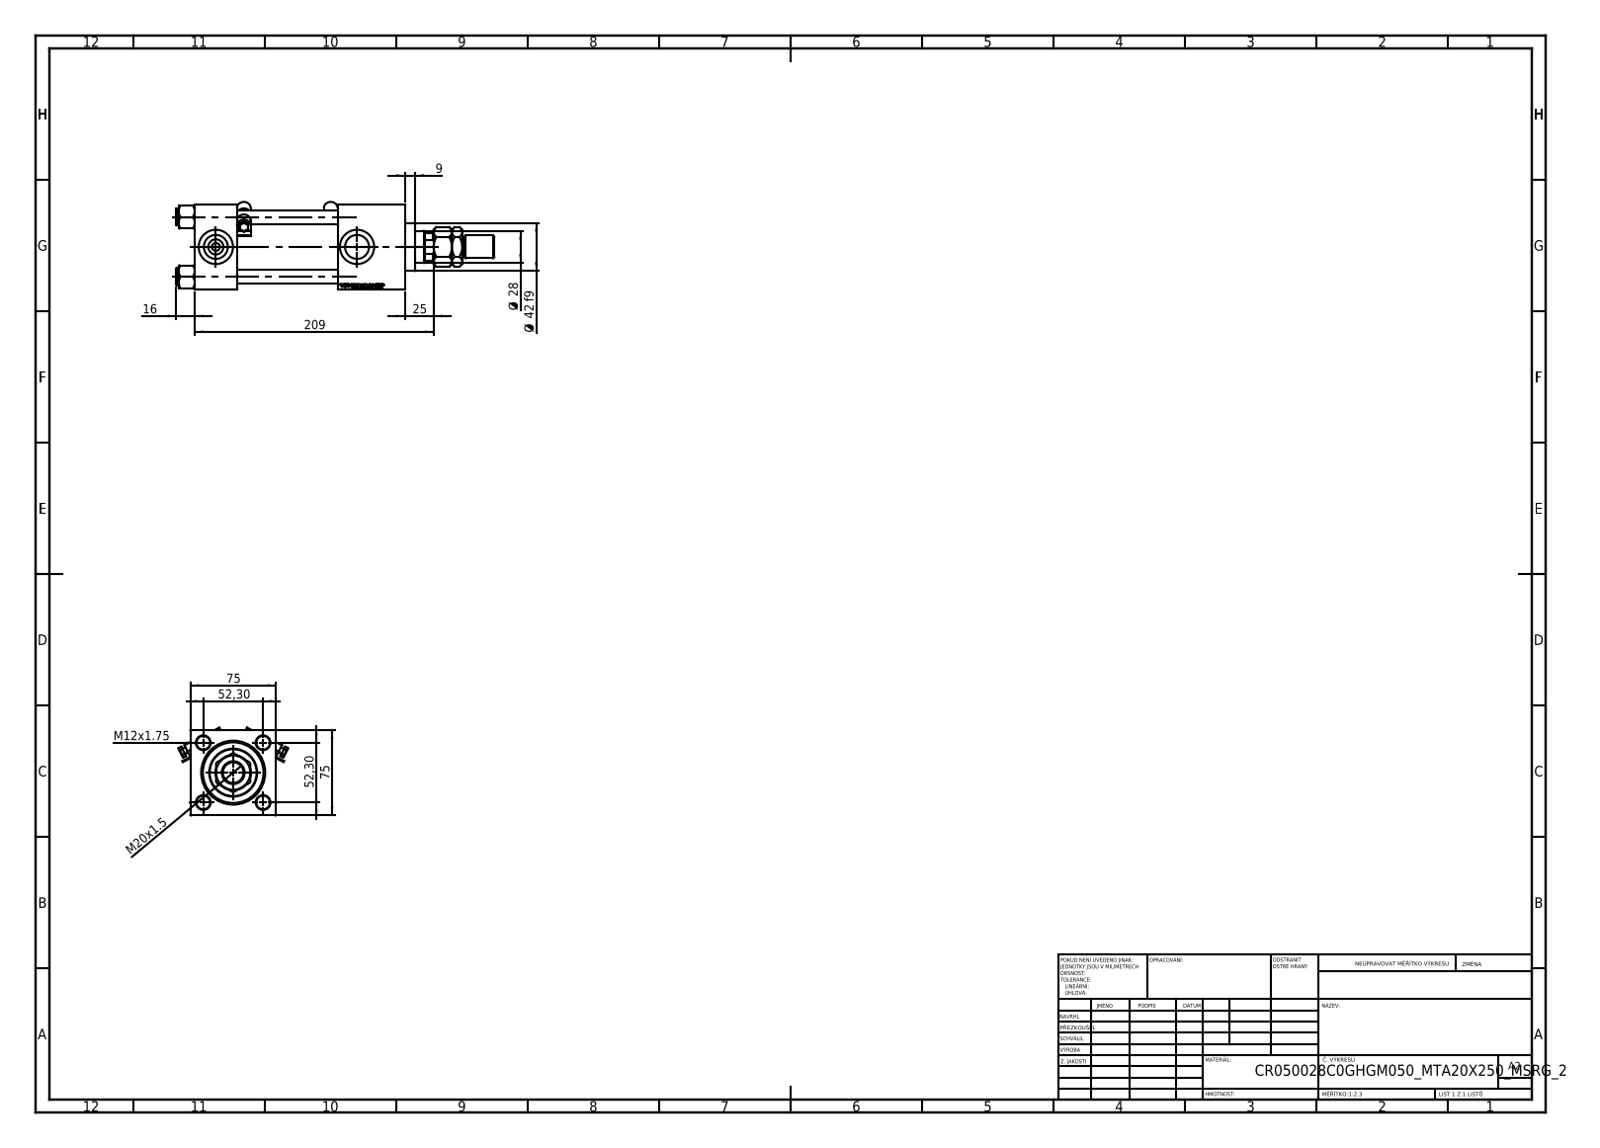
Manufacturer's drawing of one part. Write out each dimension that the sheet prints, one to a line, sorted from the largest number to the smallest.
209
75
75
52,30
52,30
Ø 42 f9
Ø 28
25
M20x1.5
16
M12x1.75
9
